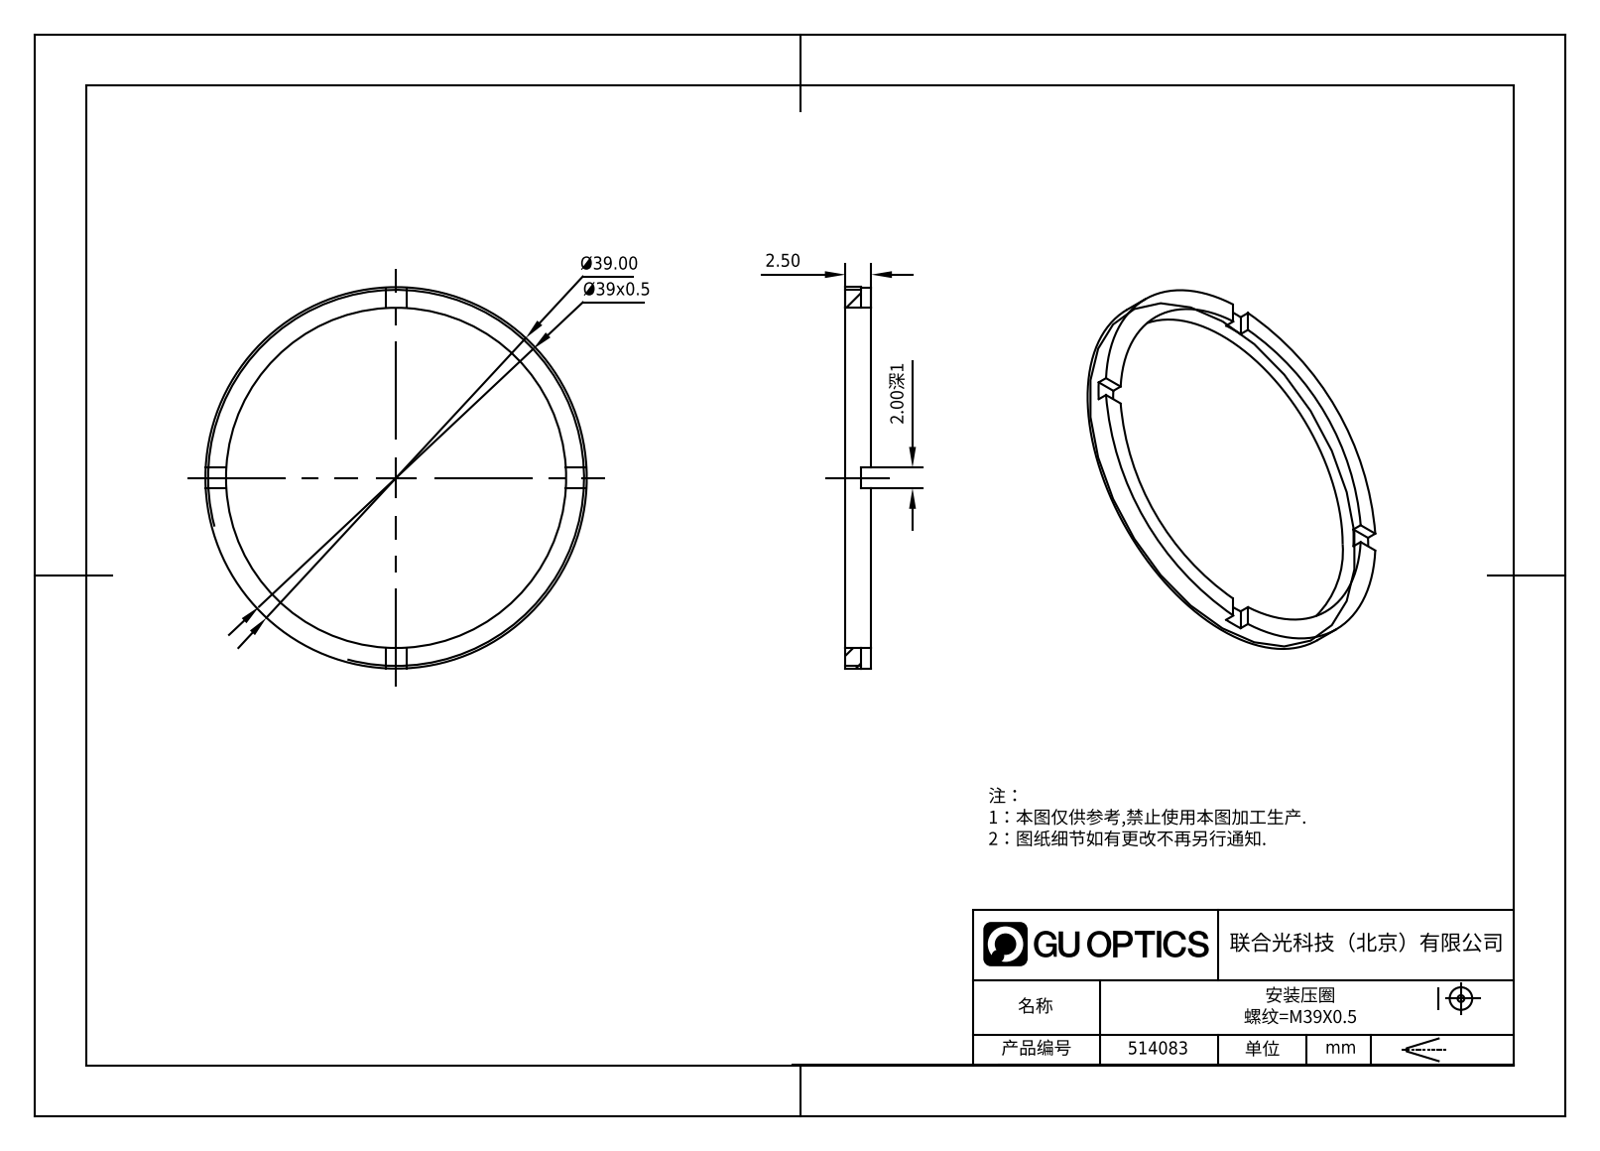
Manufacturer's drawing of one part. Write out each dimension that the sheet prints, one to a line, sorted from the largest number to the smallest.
Ø39.00
Ø39x0.5
2.50
2.00深1
